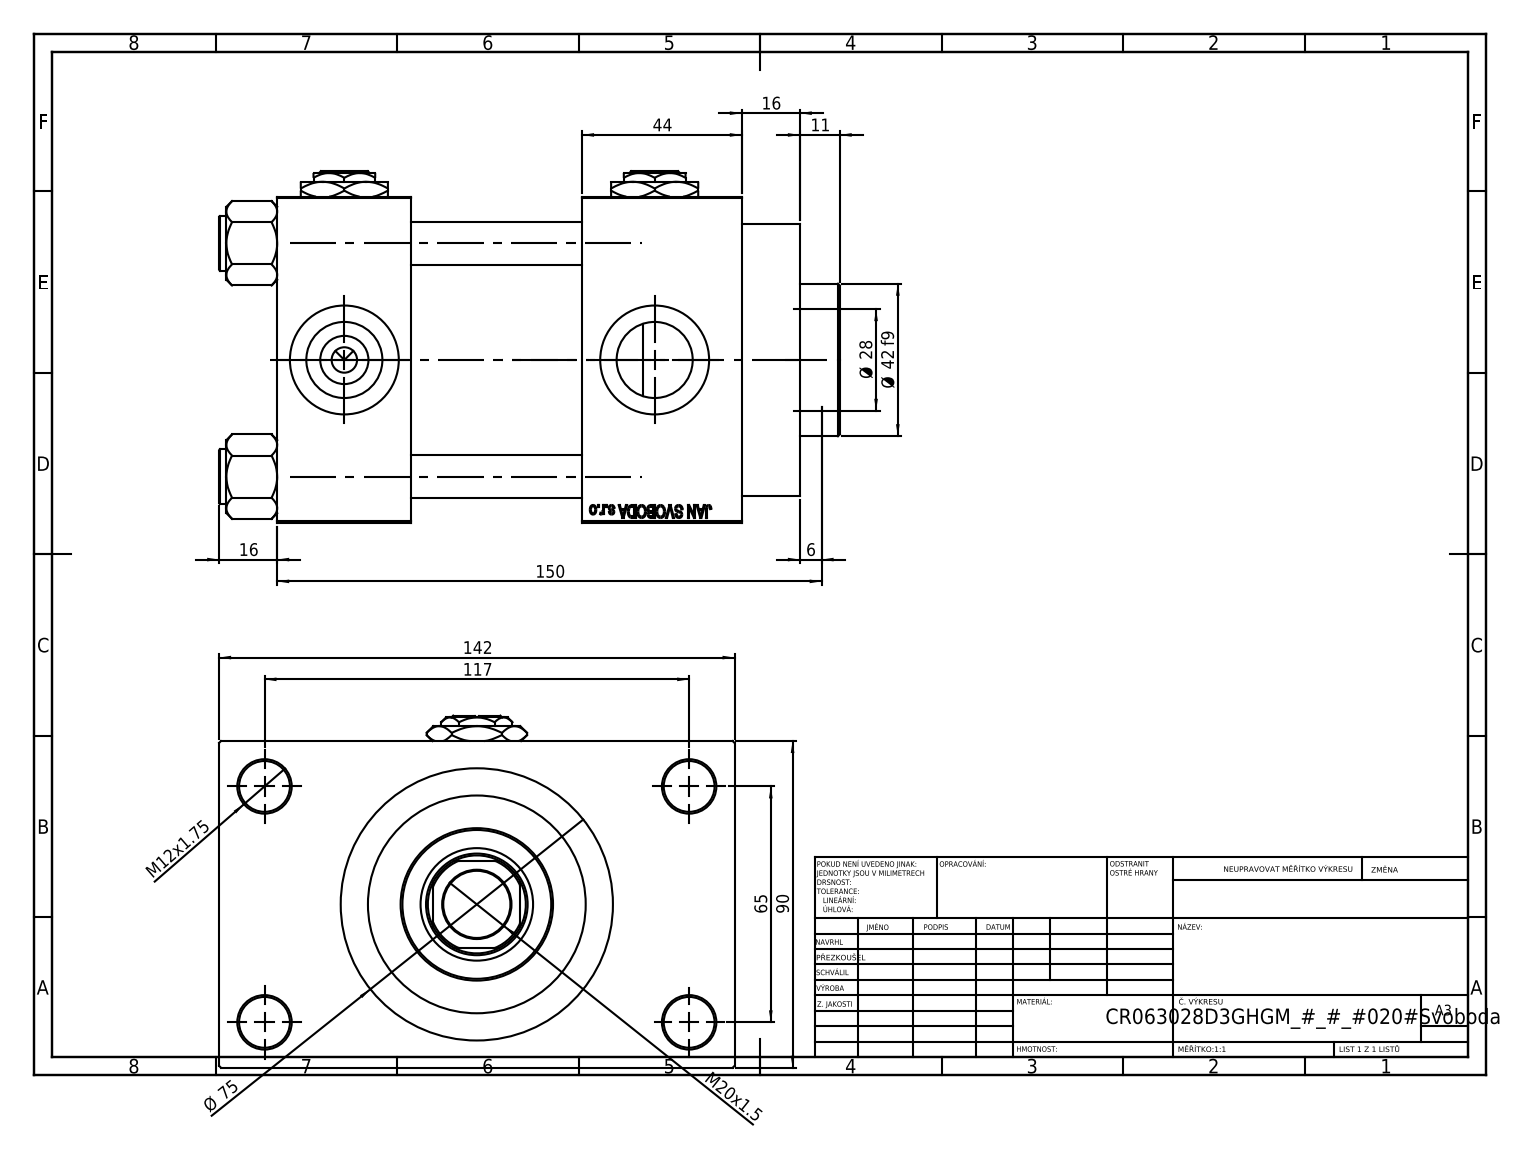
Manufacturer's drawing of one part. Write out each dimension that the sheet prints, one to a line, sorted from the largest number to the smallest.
150
142
117
90
Ø 75
65
44
Ø 42 f9
Ø 28
M20x1.5
16
16
M12x1.75
11
6
